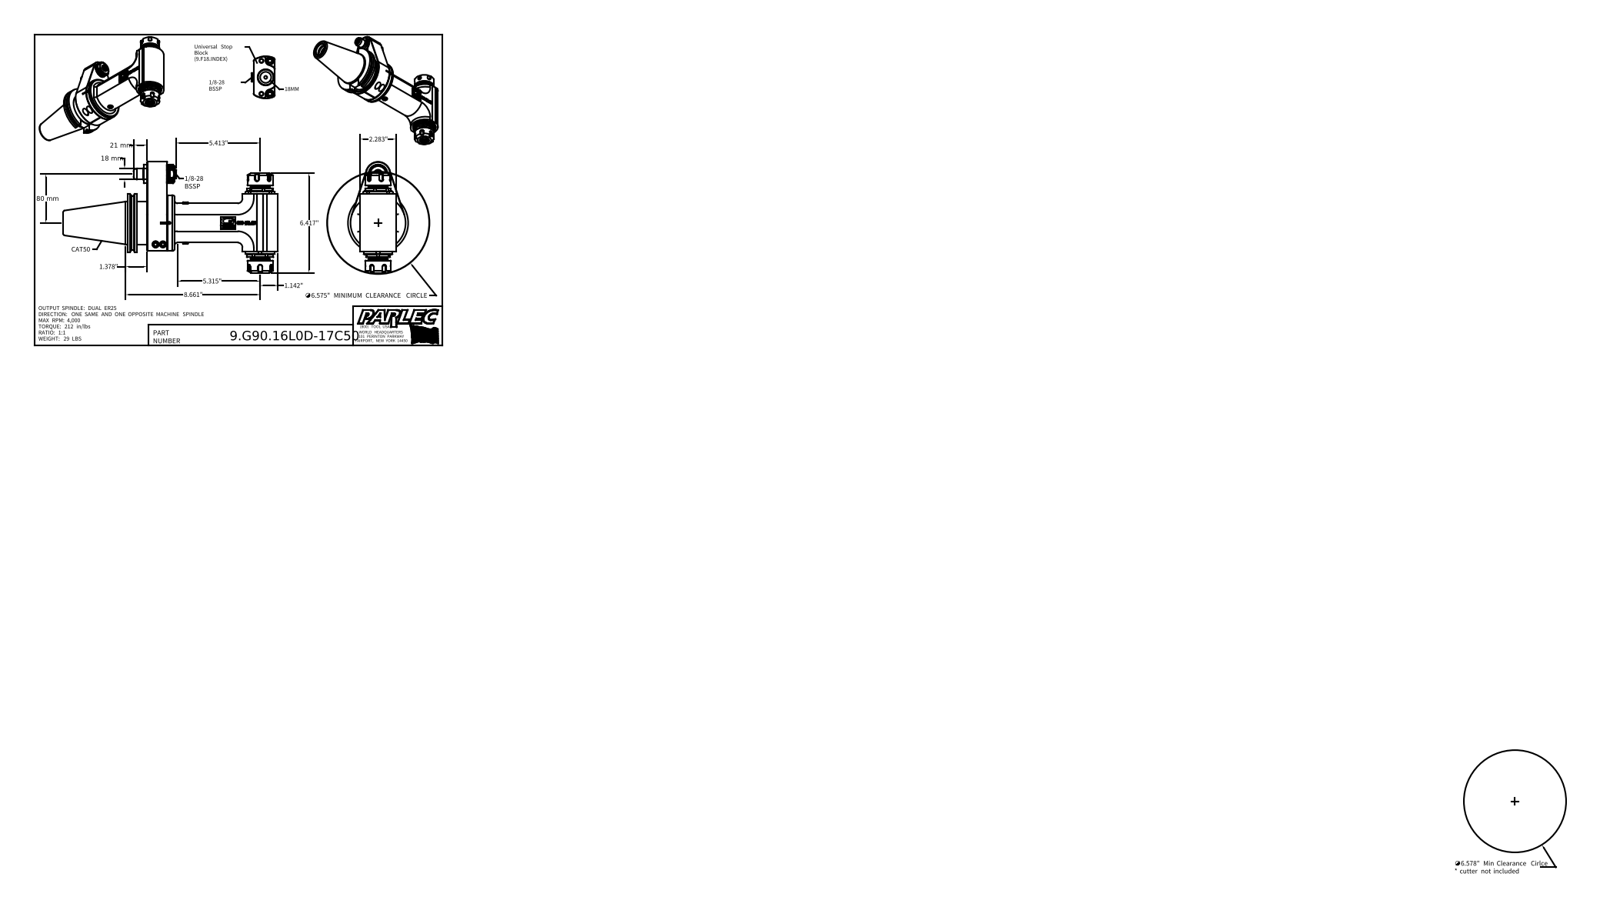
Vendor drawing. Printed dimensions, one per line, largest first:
80 mm
21 mm
18 mm
8.661"
∅6.578" Min Clearance Cirlce * cutter not included
∅6.575" MINIMUM CLEARANCE CIRCLE
6.417"
5.413"
5.315"
2.283"
1.378"
1.142"
